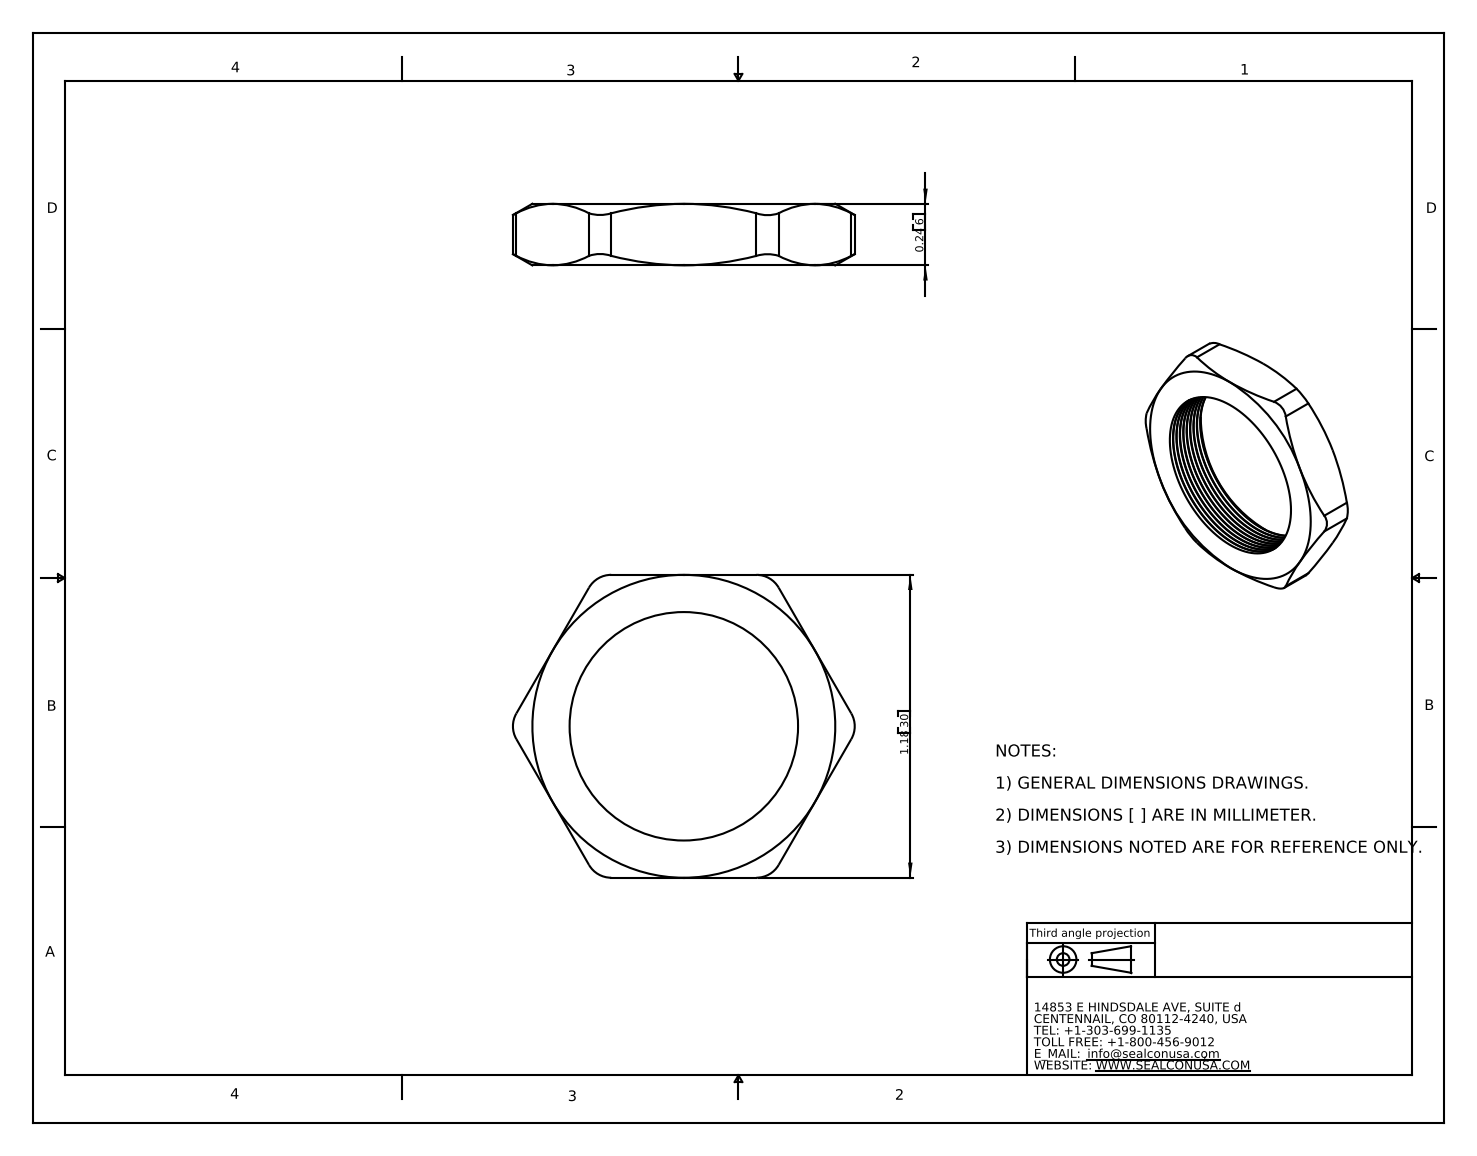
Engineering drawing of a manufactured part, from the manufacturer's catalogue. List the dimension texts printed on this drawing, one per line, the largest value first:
1.18 30
0.24 6
